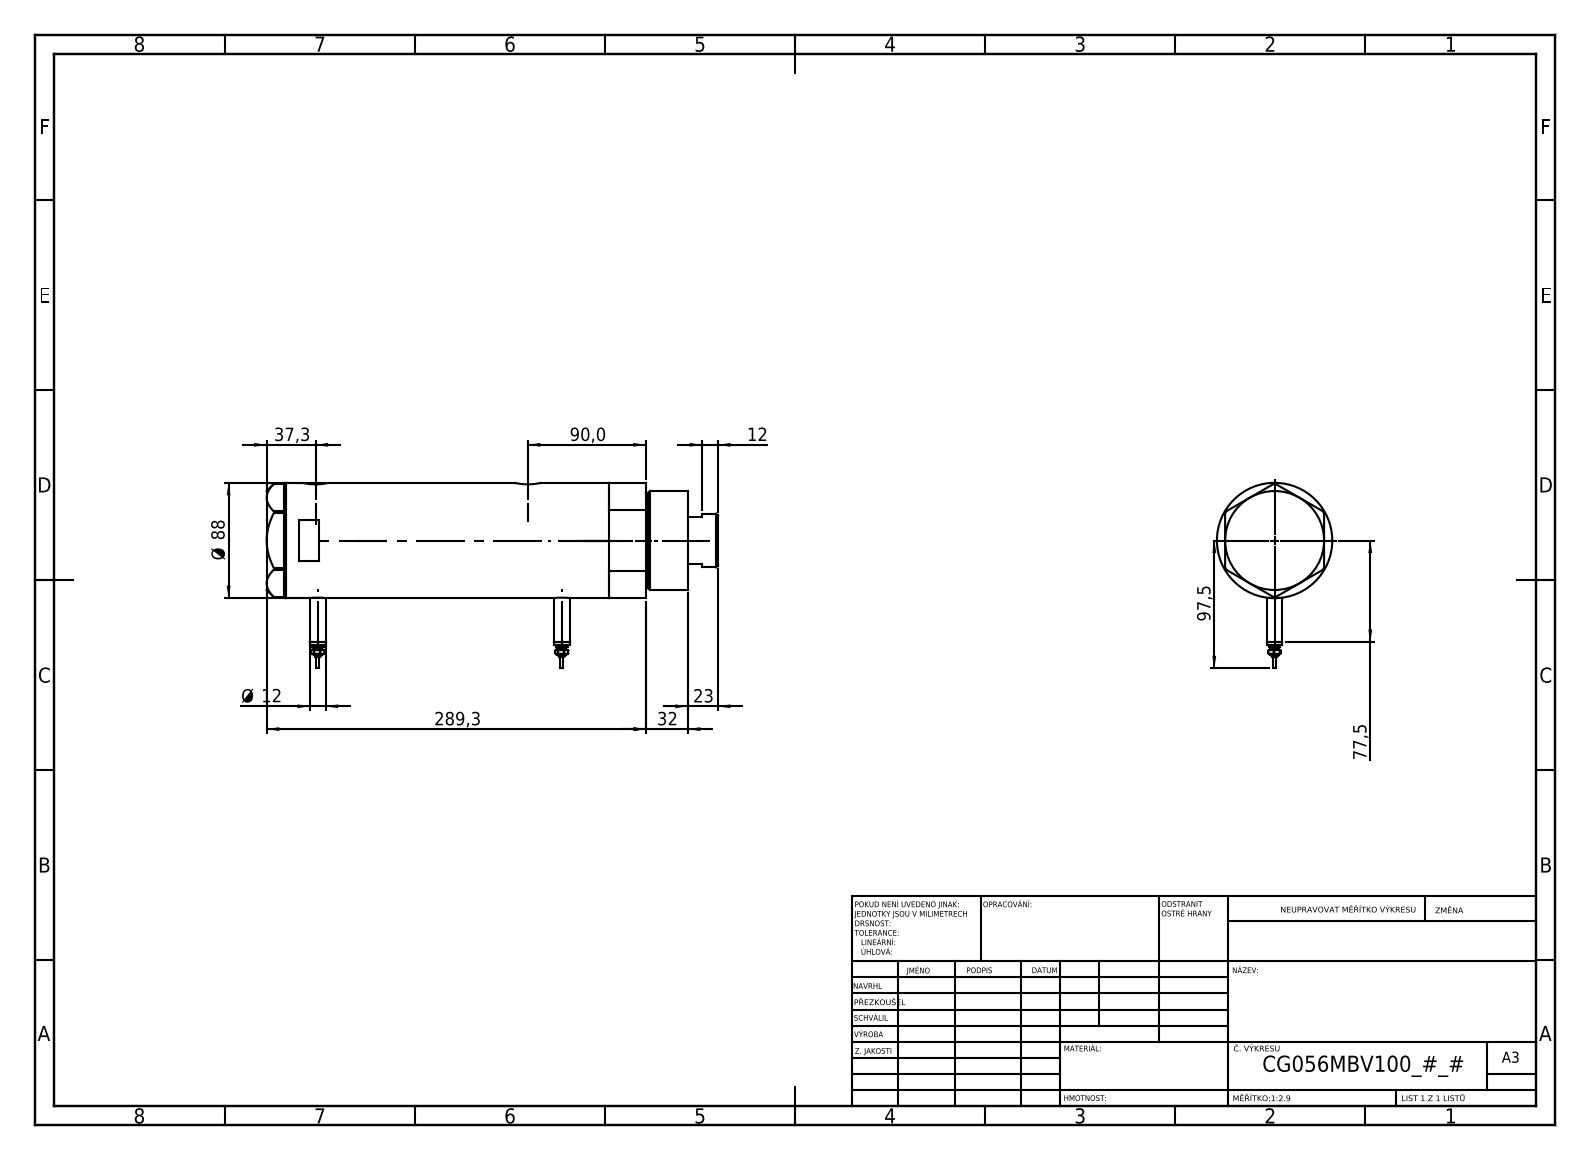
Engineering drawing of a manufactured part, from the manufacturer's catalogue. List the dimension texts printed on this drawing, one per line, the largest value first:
289,3
97,5
90,0
Ø 88
77,5
37,3
32
23
12
Ø 12
